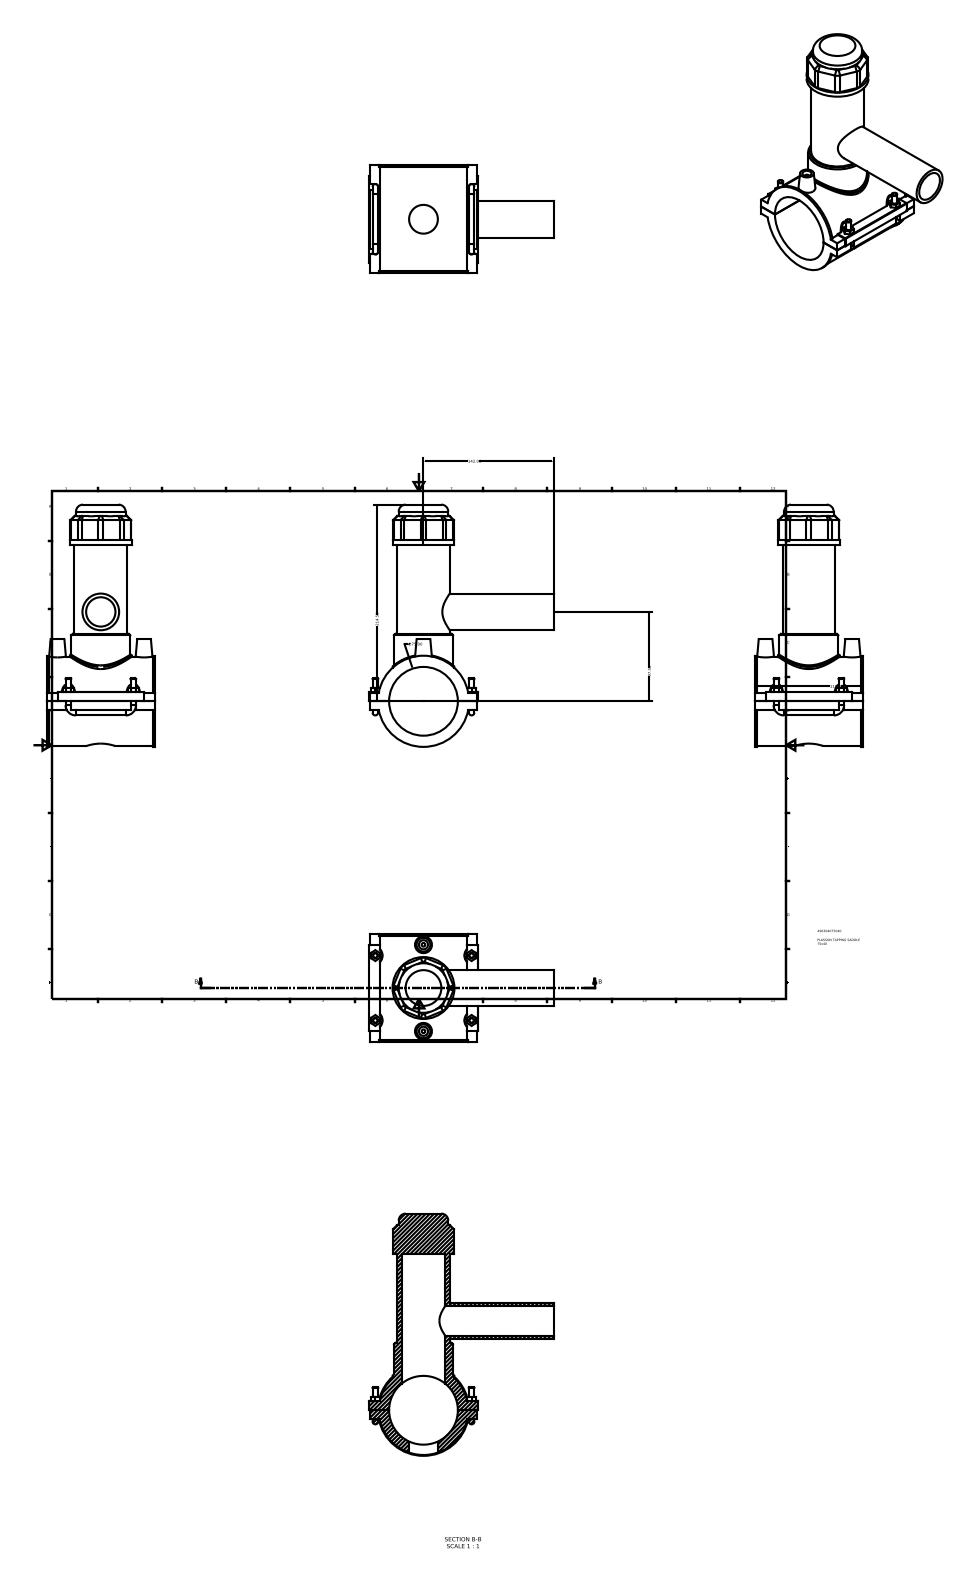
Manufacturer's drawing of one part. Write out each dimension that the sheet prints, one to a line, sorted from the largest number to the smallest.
214.50
142.00
118.00
97.50
∅75.00
